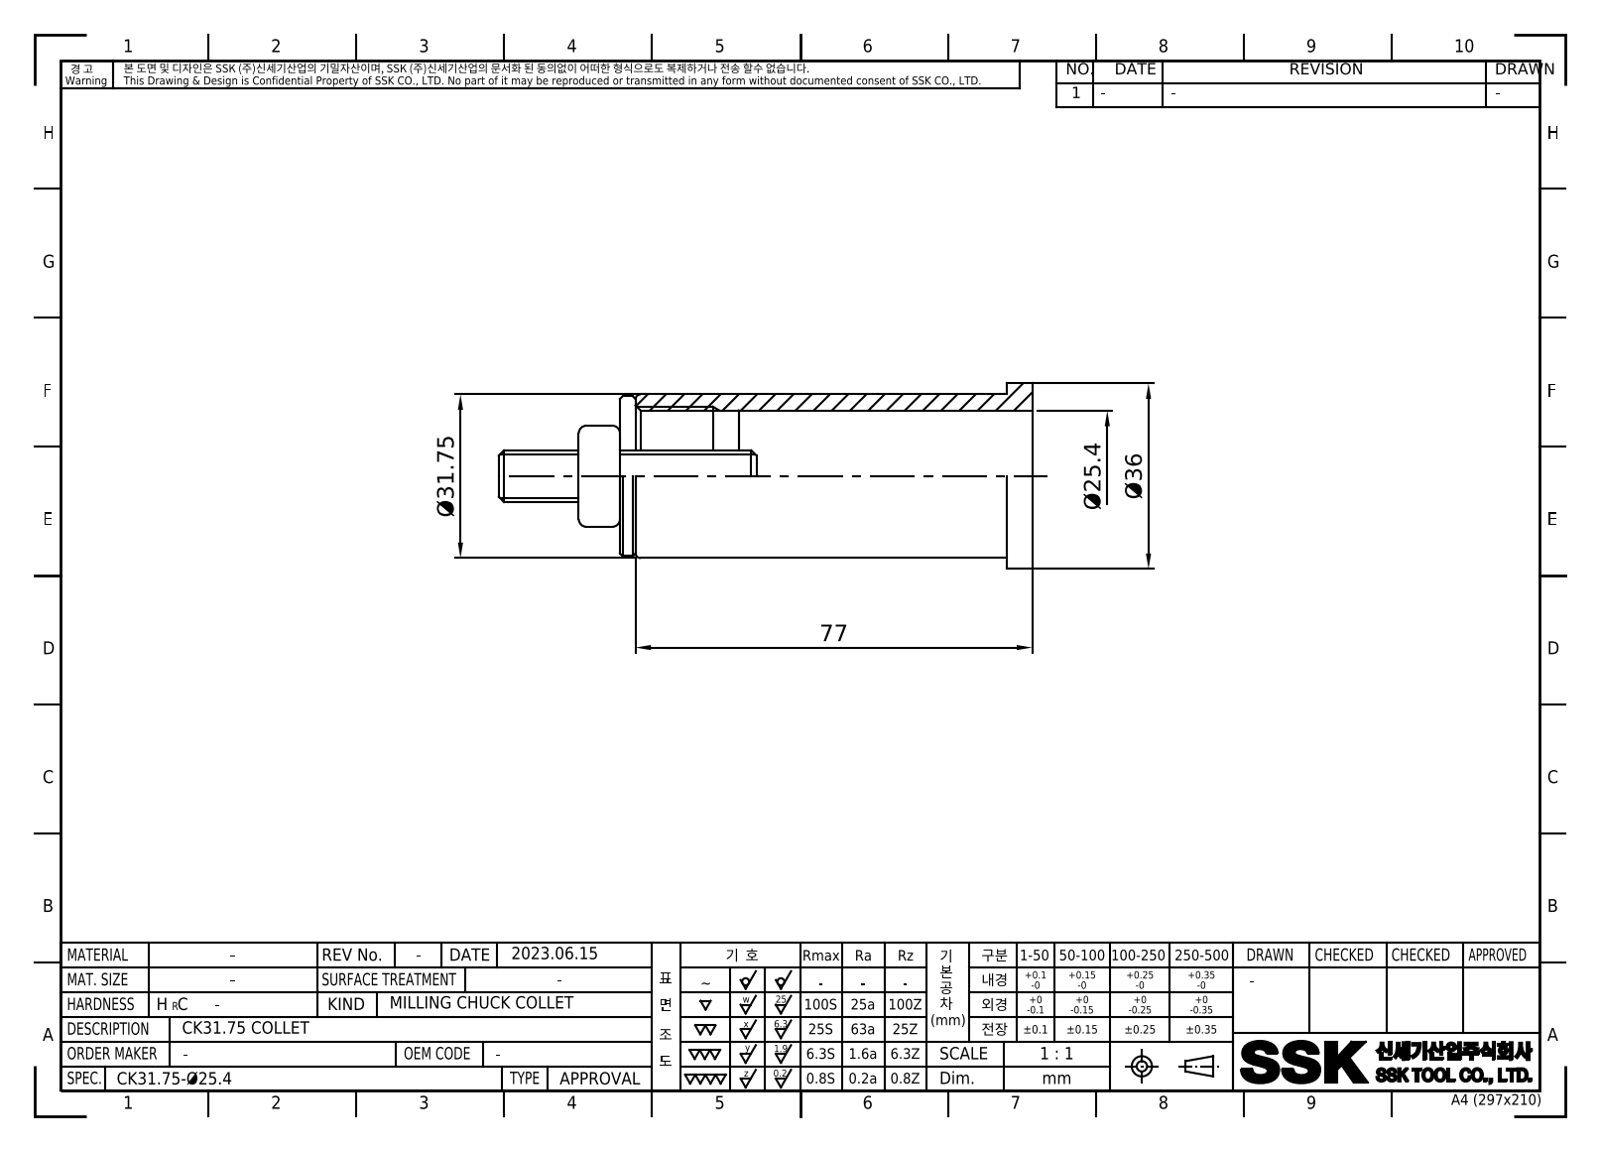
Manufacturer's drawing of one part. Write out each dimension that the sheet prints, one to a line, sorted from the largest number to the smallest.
77
Ø36
Ø31.75
Ø25.4
